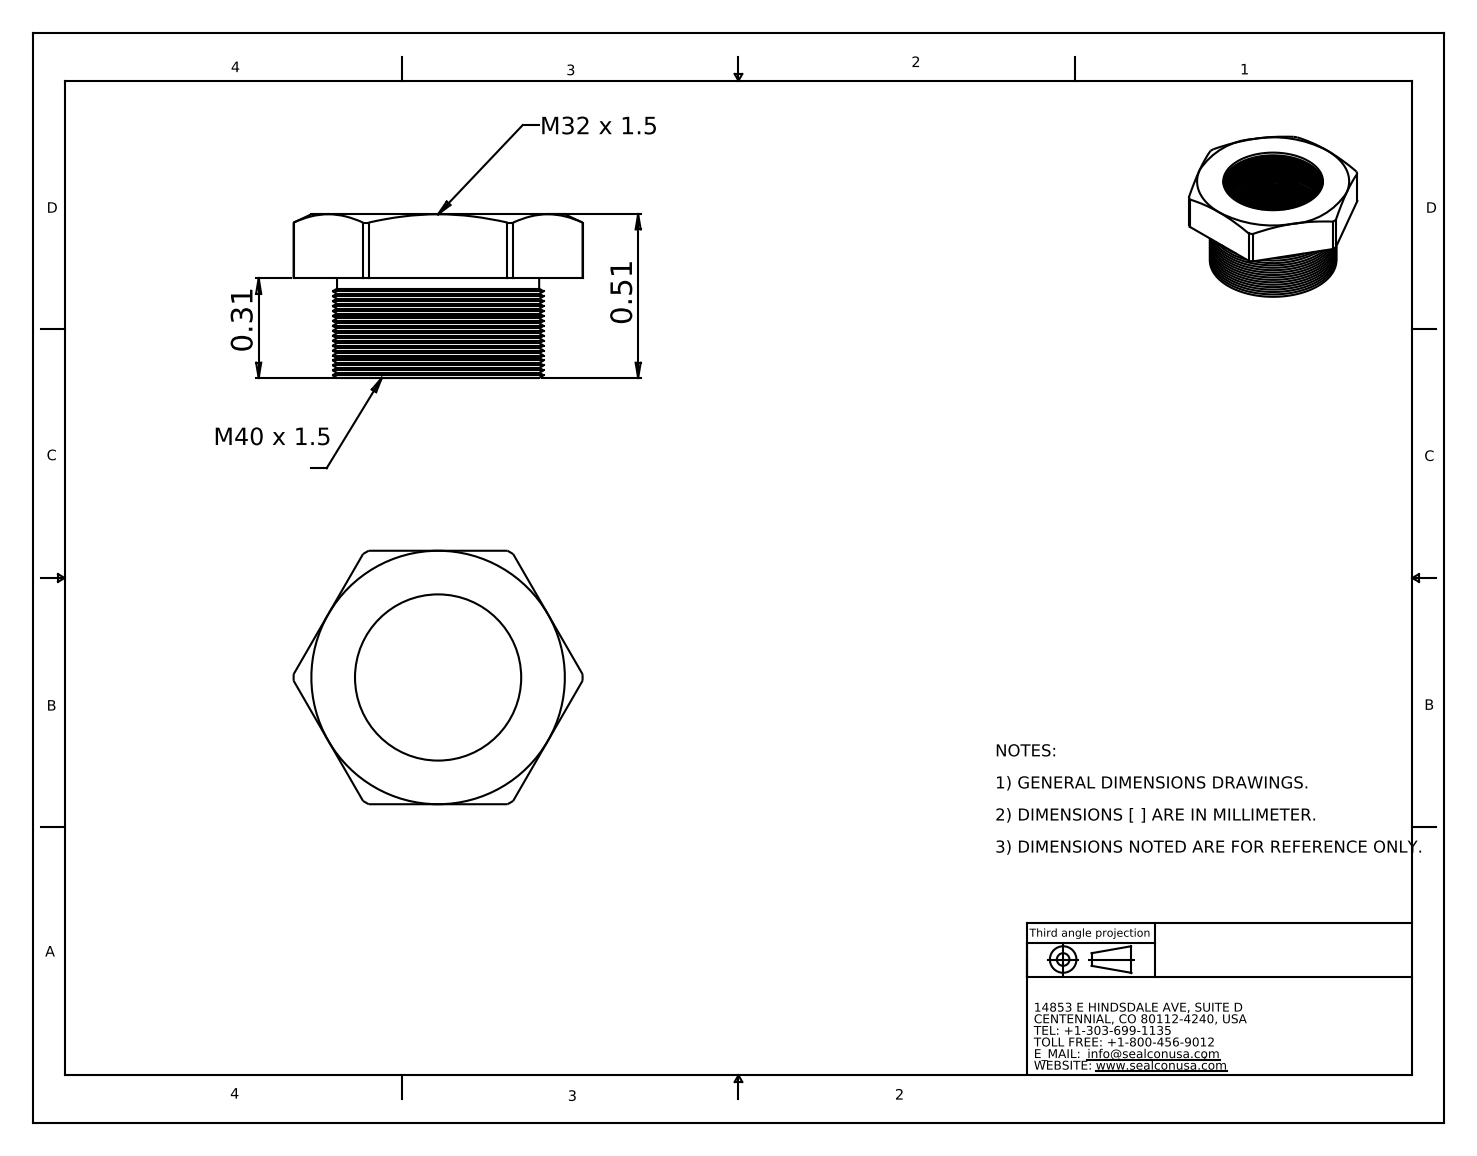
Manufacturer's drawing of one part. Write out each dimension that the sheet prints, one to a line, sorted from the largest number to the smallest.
0.51
0.31
